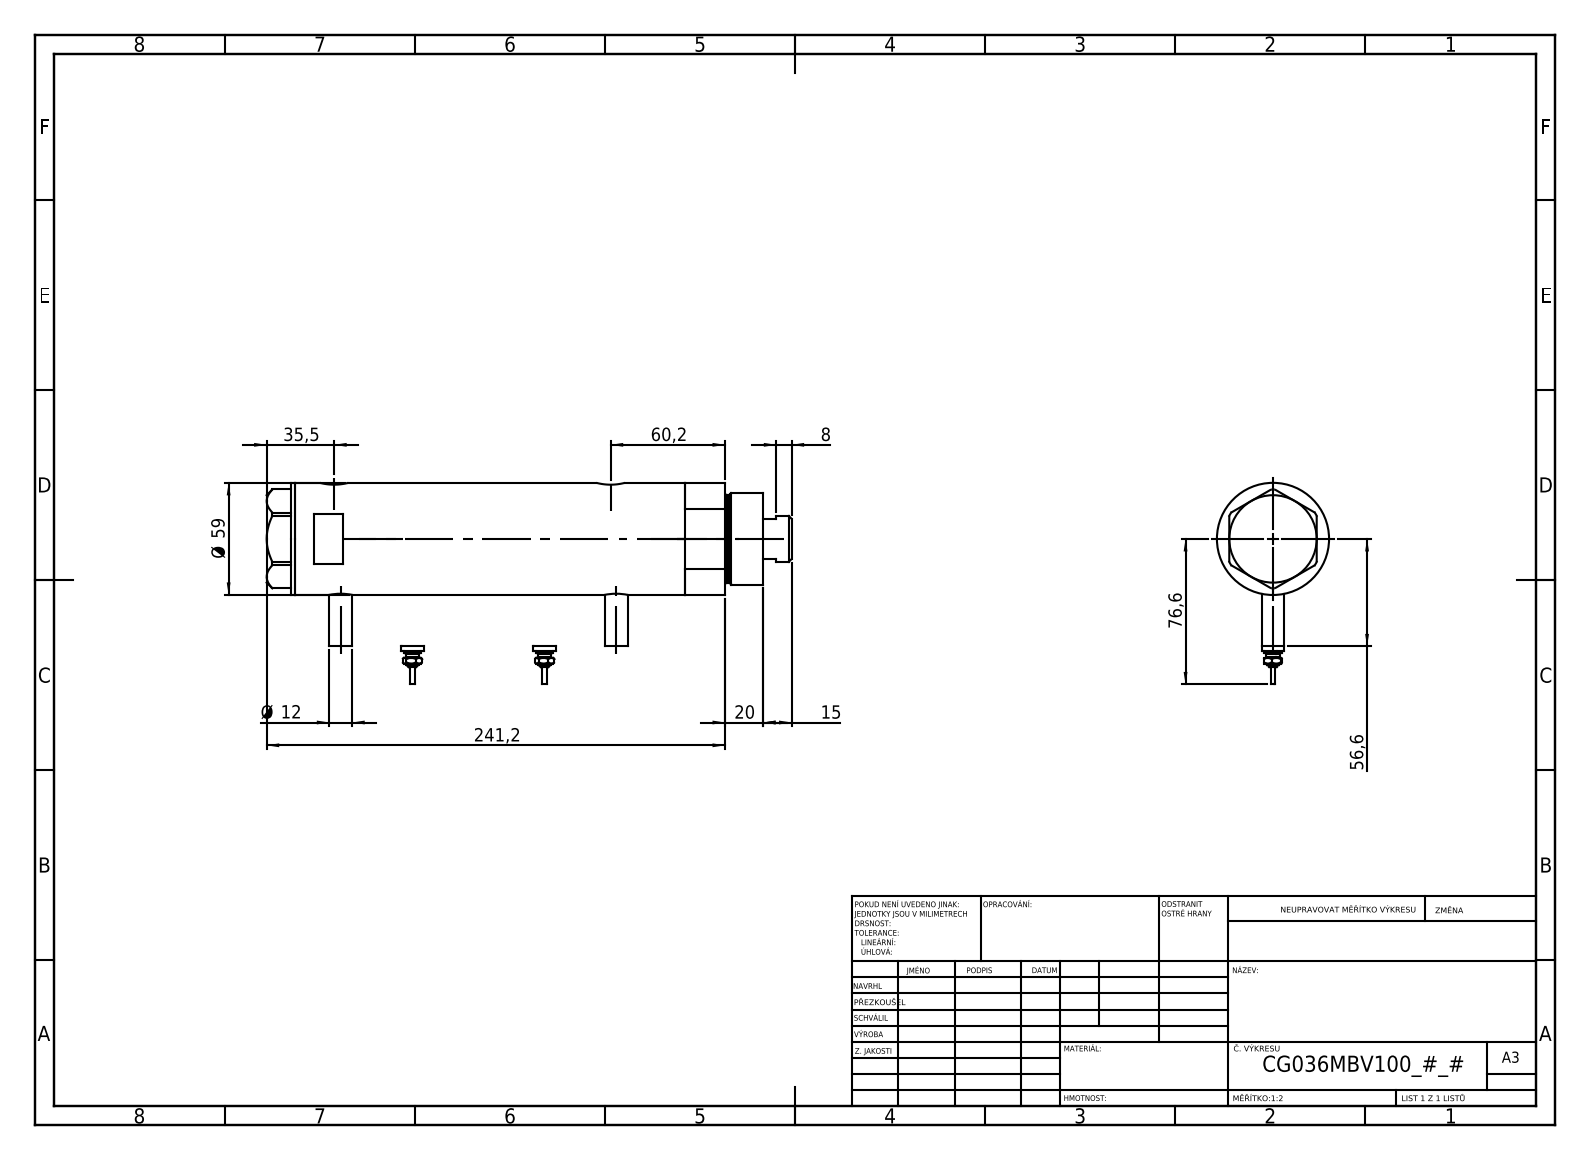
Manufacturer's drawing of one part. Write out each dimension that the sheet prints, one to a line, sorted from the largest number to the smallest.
241,2
76,6
60,2
Ø 59
56,6
35,5
20
15
Ø 12
8
